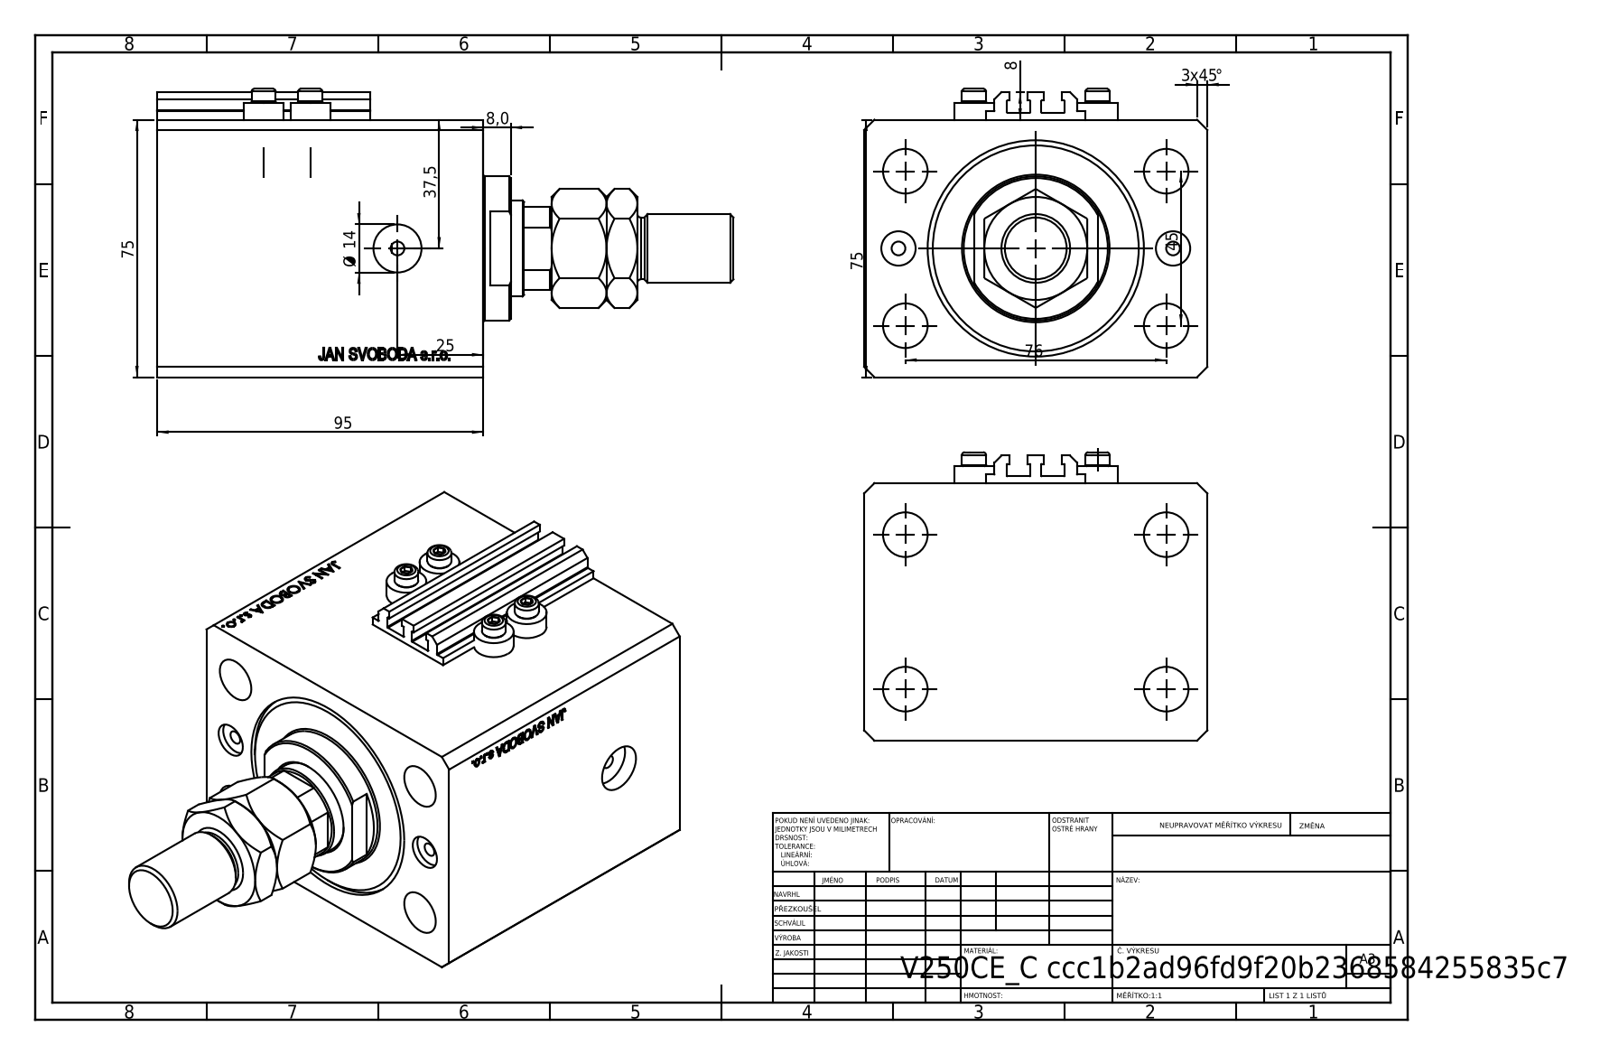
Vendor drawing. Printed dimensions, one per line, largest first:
95
76
75
75
3 x45 °
45
37,5
25
Ø 14
8
8,0
